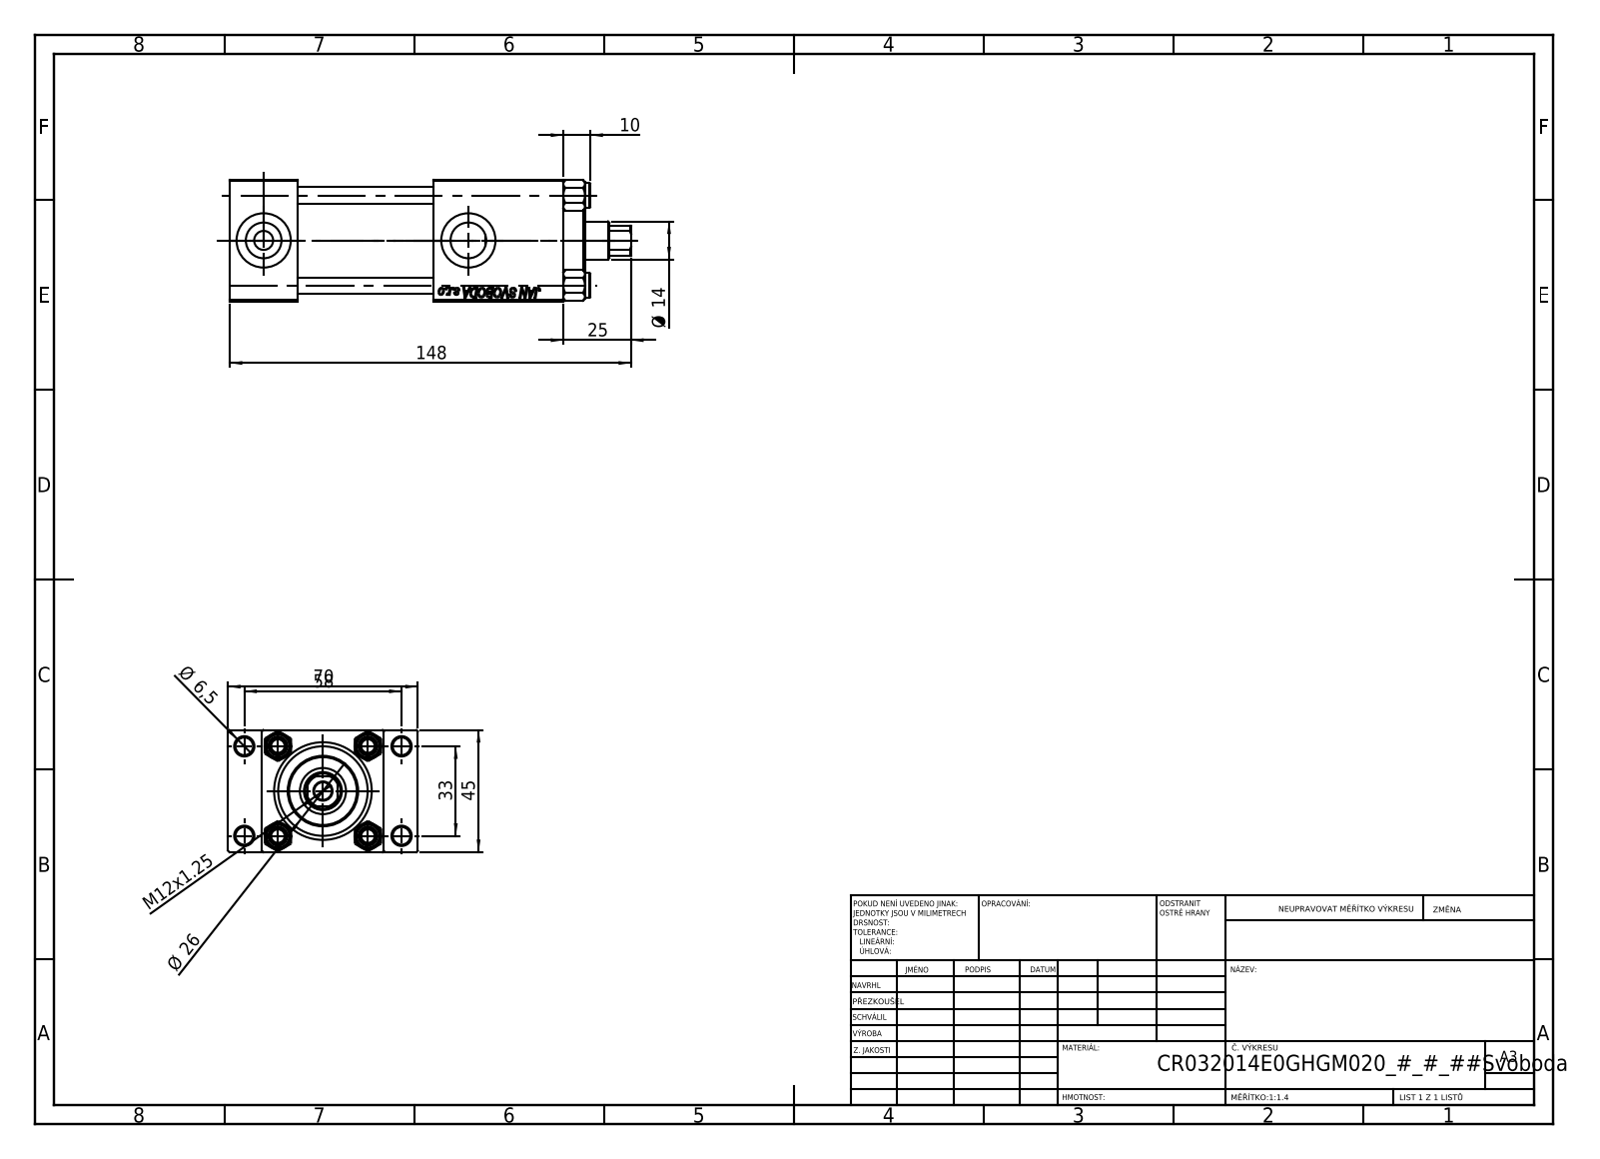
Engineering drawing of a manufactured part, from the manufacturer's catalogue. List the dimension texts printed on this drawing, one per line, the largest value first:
148
70
58
45
33
Ø 26
25
Ø 14
M12x1.25
10
Ø 6,5
